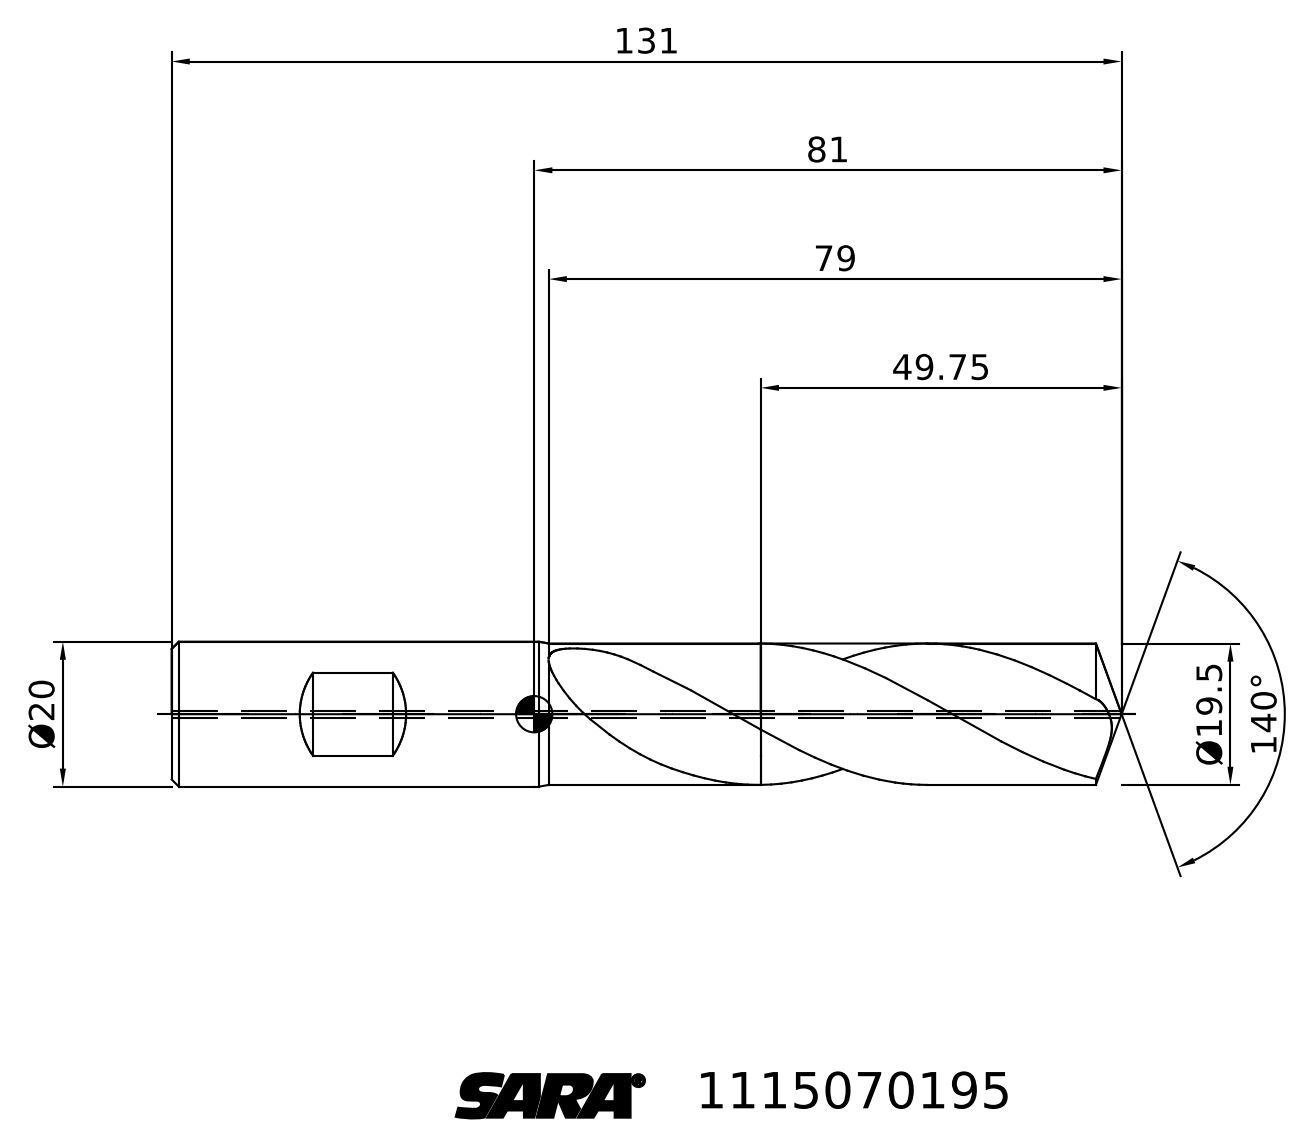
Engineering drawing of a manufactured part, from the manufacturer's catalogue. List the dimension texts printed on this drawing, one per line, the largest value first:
140°
131
81
79
49.75
Ø20
Ø19.5
